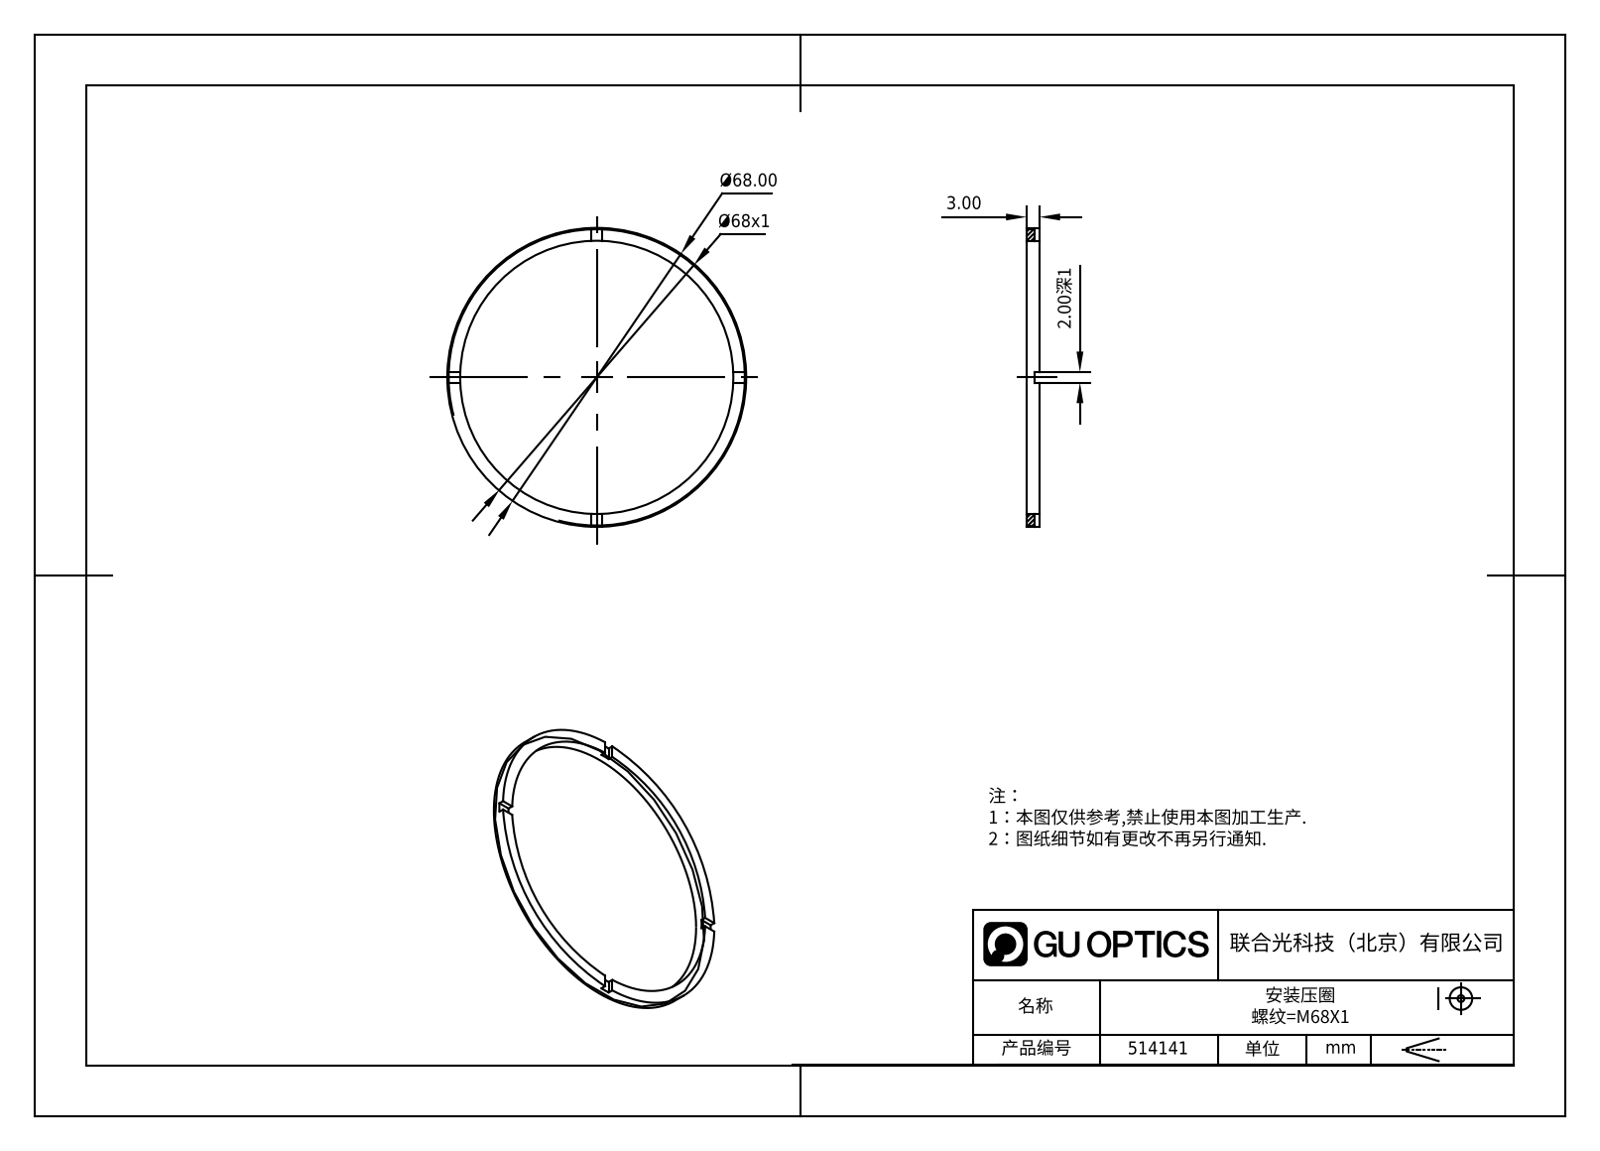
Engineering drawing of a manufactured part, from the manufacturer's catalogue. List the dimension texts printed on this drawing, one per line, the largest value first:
Ø68.00
Ø68x1
3.00
2.00深1
